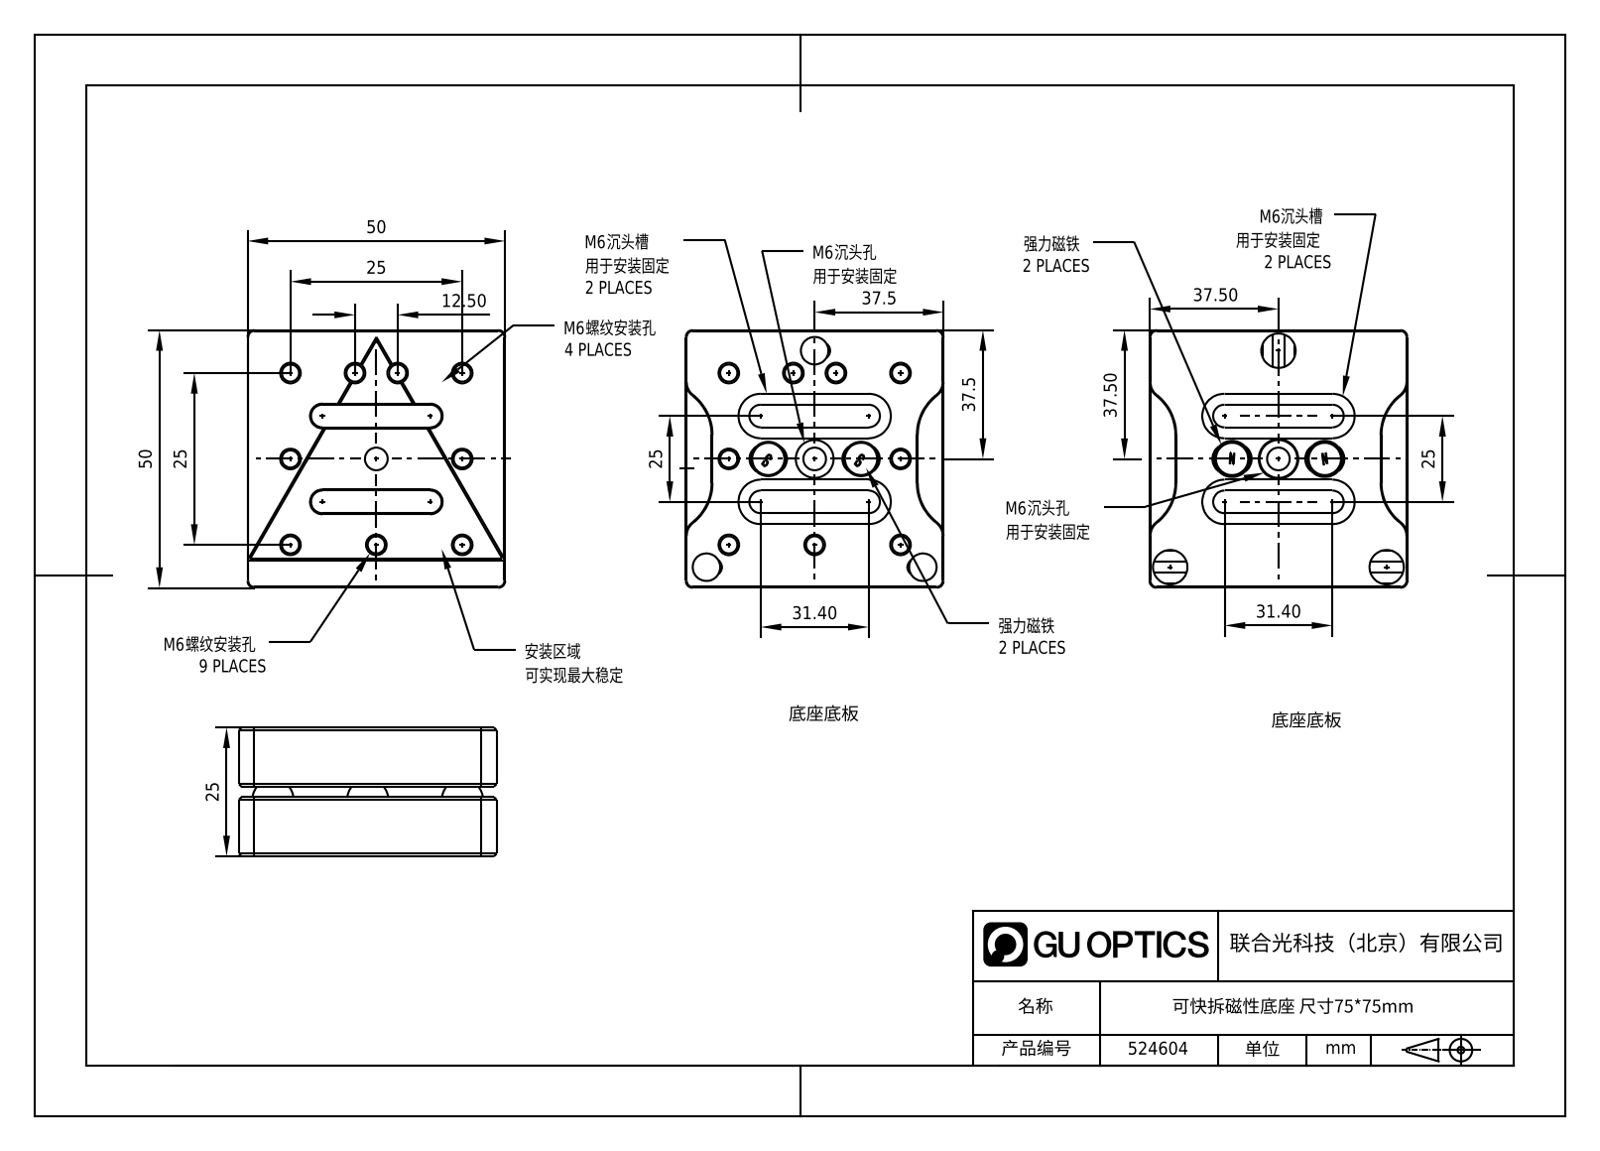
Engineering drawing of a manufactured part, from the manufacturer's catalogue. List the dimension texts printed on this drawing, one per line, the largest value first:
50
50
37.5
37.5
37.50
37.50
31.40
31.40
25
25
25
25
25
12.50
